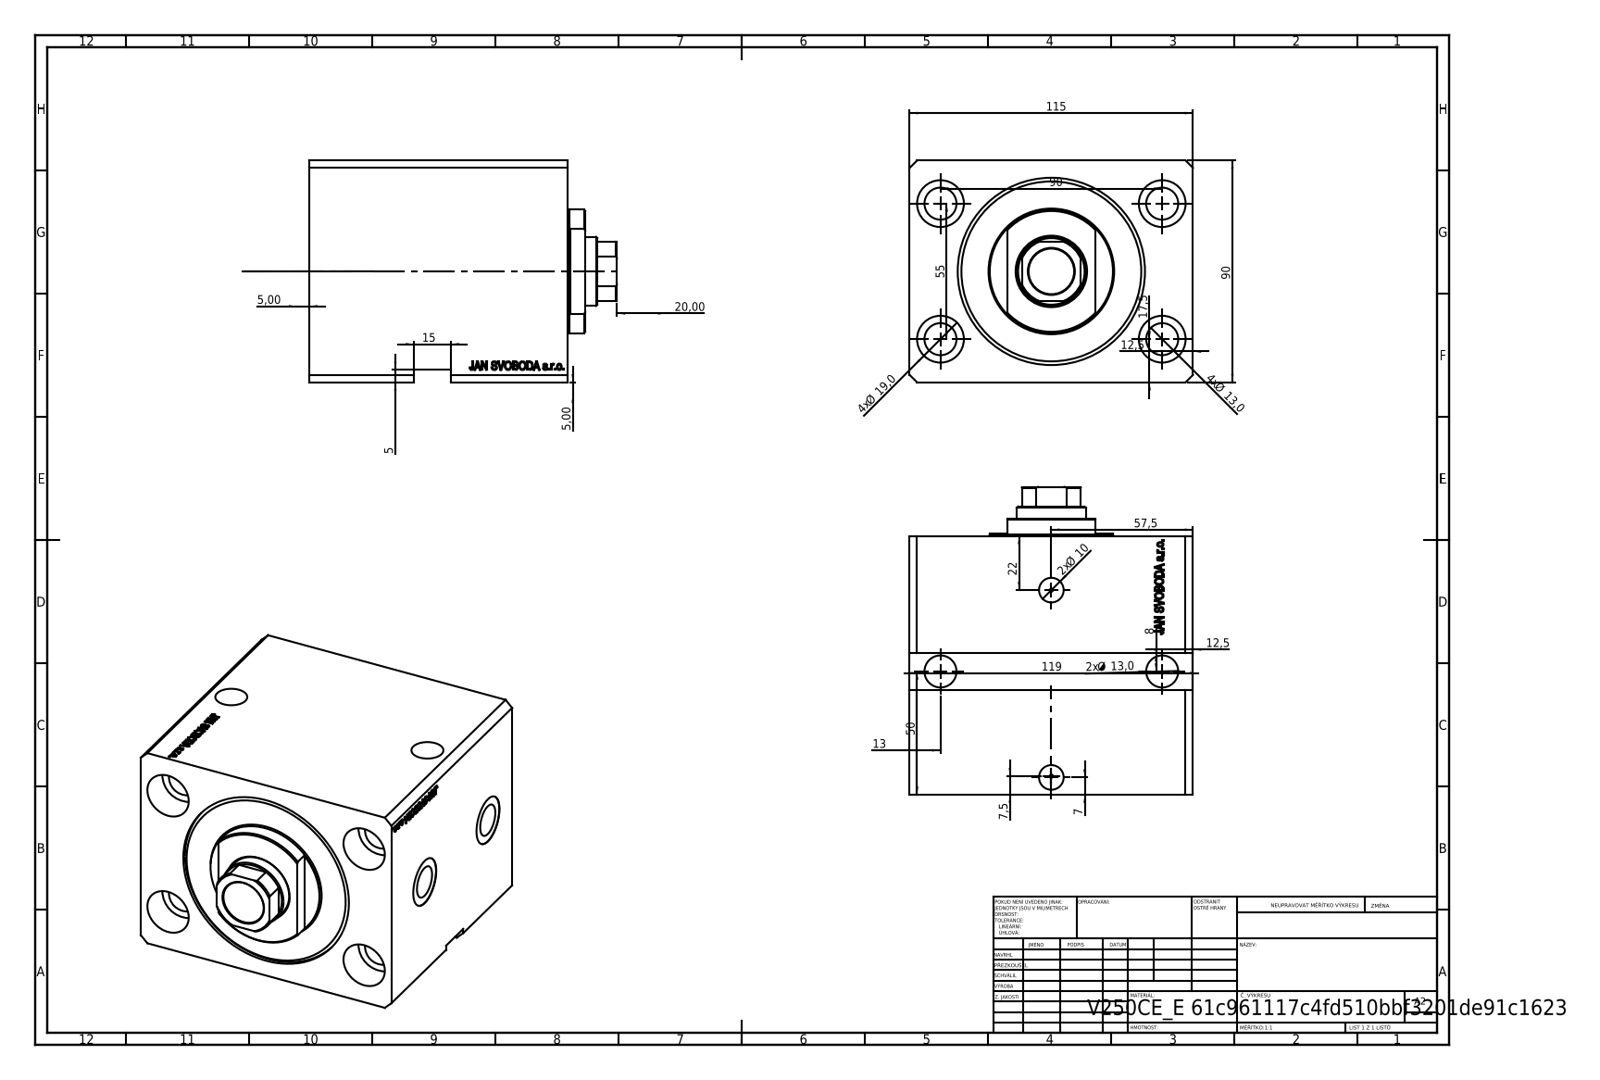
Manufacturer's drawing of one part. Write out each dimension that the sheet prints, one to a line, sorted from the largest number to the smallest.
119
115
90
90
57,5
55
50
22
20,00
4x Ø 19,0
17,5
15
4x Ø 13,0
2x Ø 13,0
13
12,5
12,5
2x Ø 10
8
7,5
7
5,00
5,00
5
